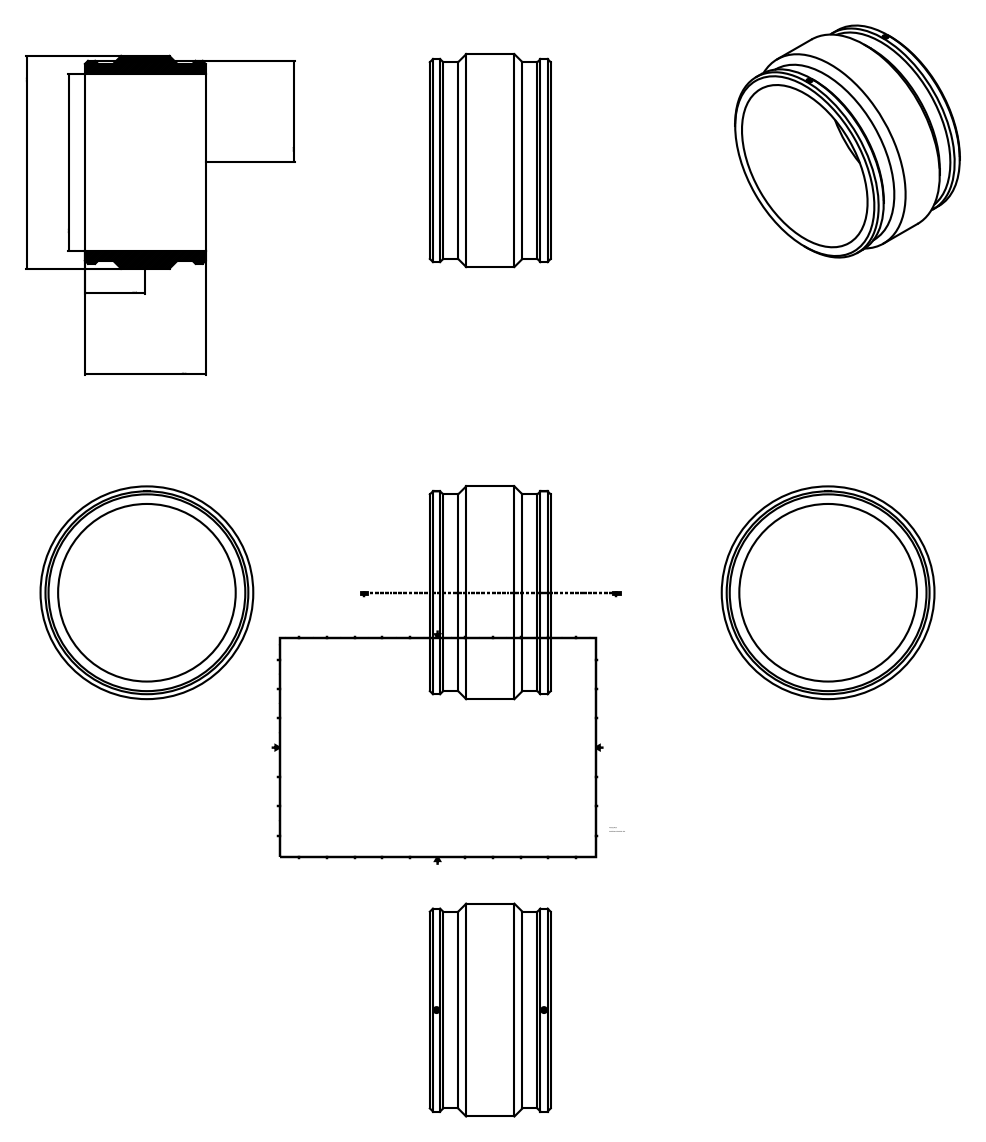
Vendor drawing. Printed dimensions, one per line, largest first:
539,00
450,00
306,00
257,00
153,00
